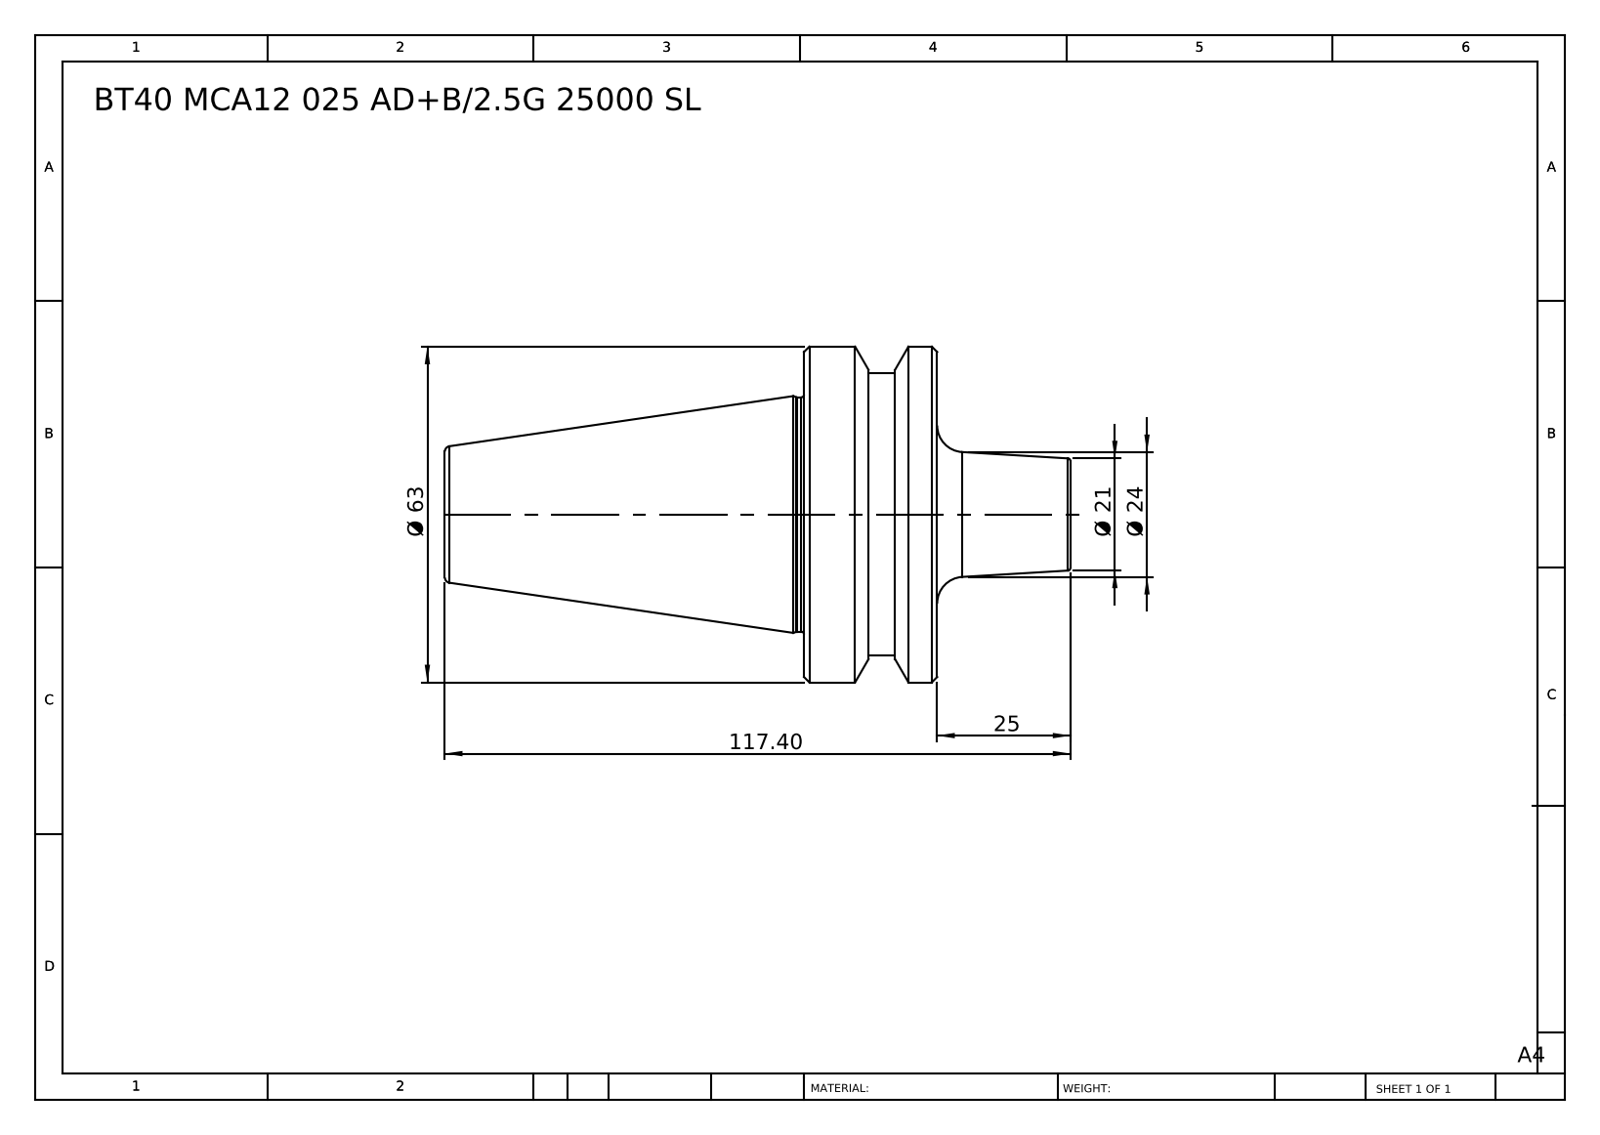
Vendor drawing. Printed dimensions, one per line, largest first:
117.40
Ø 63
25
Ø 24
Ø 21
